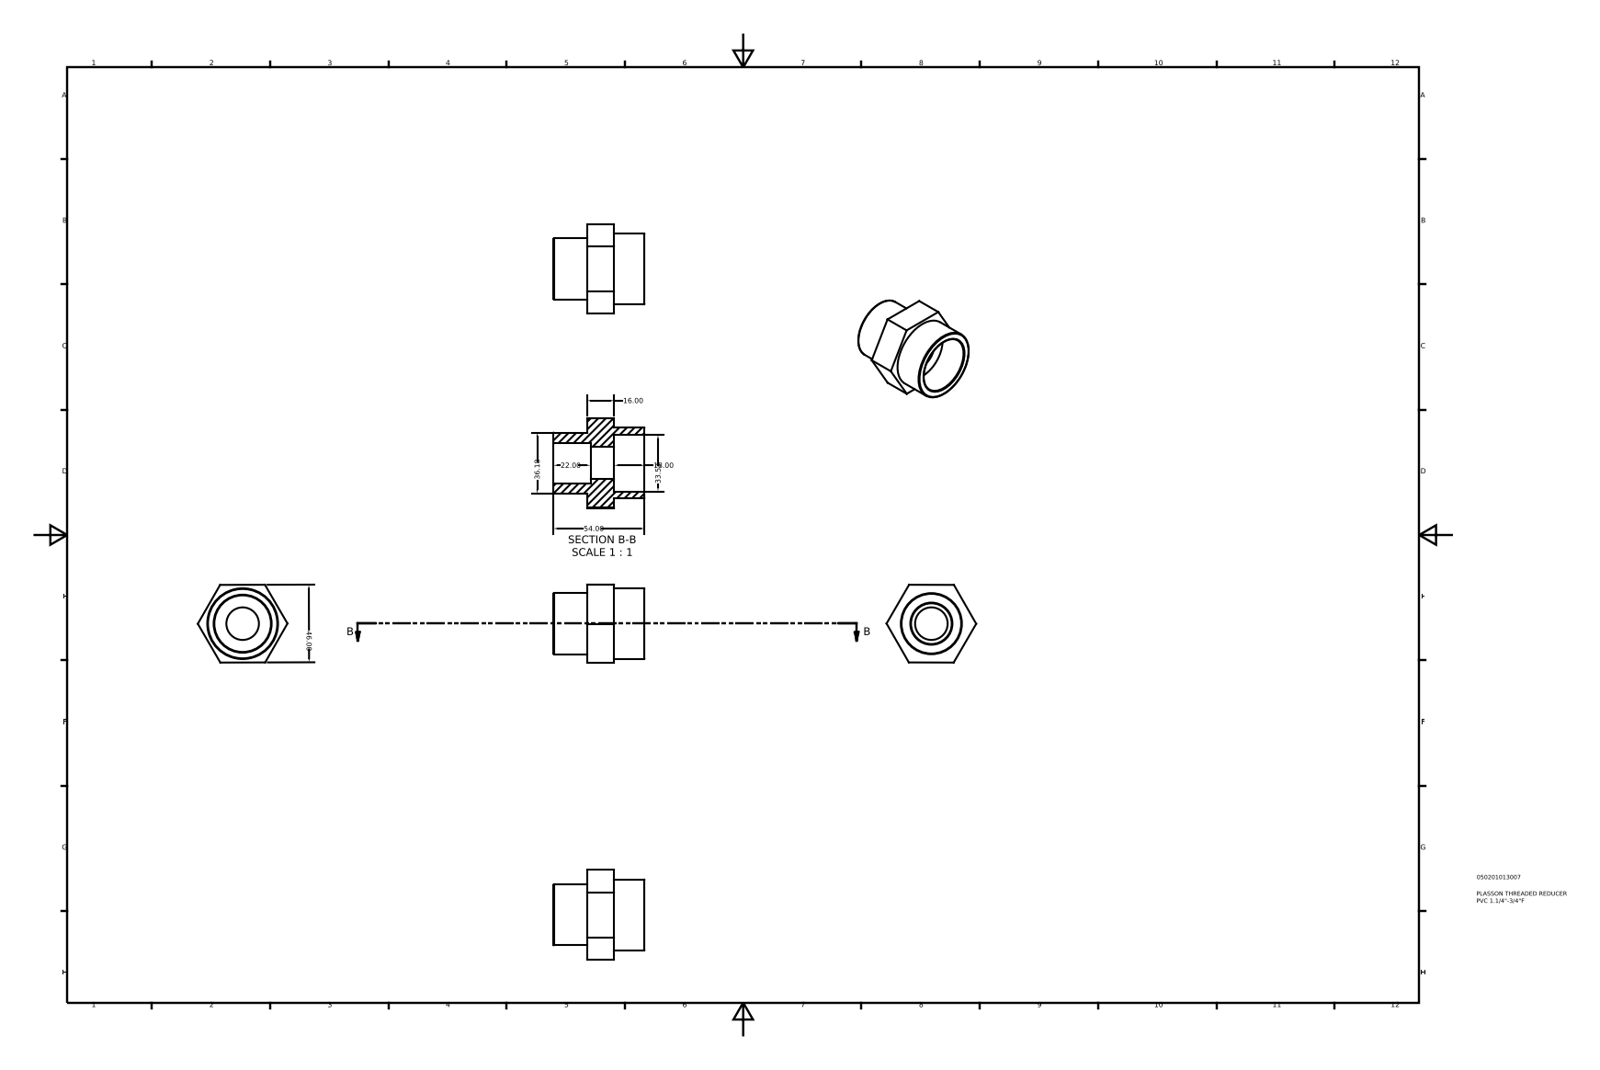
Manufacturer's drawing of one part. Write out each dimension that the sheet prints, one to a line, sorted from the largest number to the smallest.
54.00
46.00
36.18
33.53
22.00
18.00
16.00
